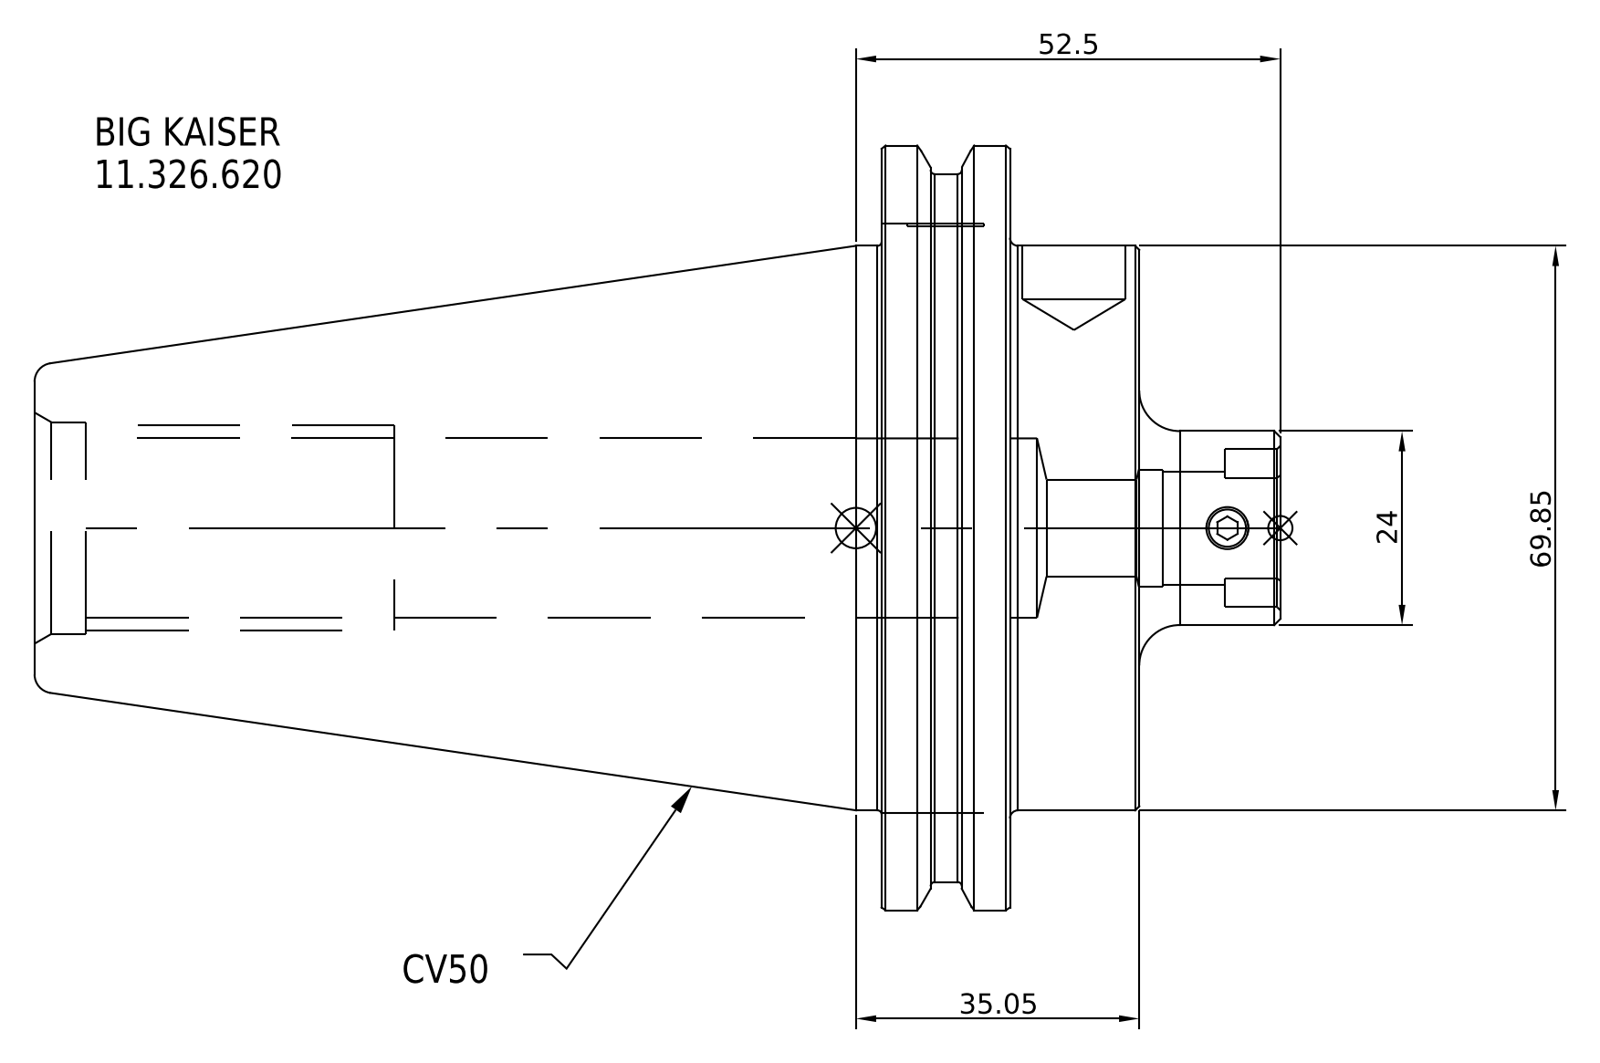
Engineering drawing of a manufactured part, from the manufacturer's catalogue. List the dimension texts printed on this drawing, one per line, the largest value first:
69.85
52.5
35.05
24
